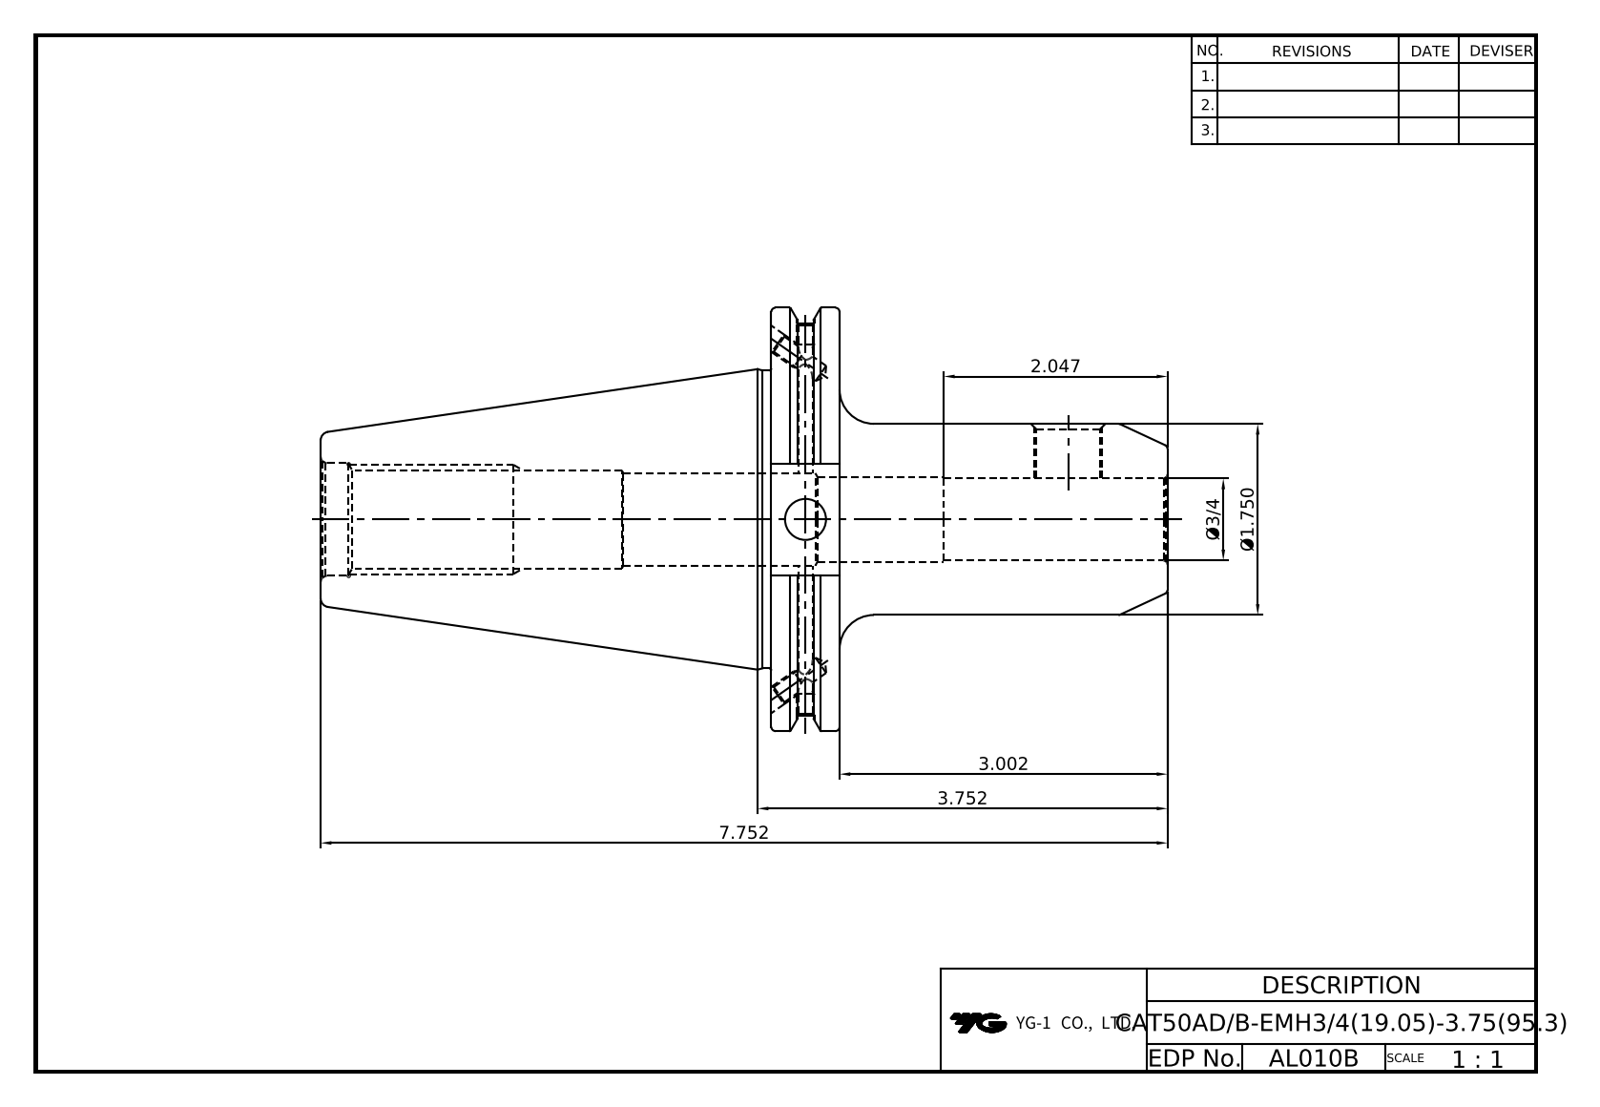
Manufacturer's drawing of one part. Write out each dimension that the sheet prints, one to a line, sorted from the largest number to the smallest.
7.752
3.752
3.002
2.047
Ø1.750
Ø3/4
